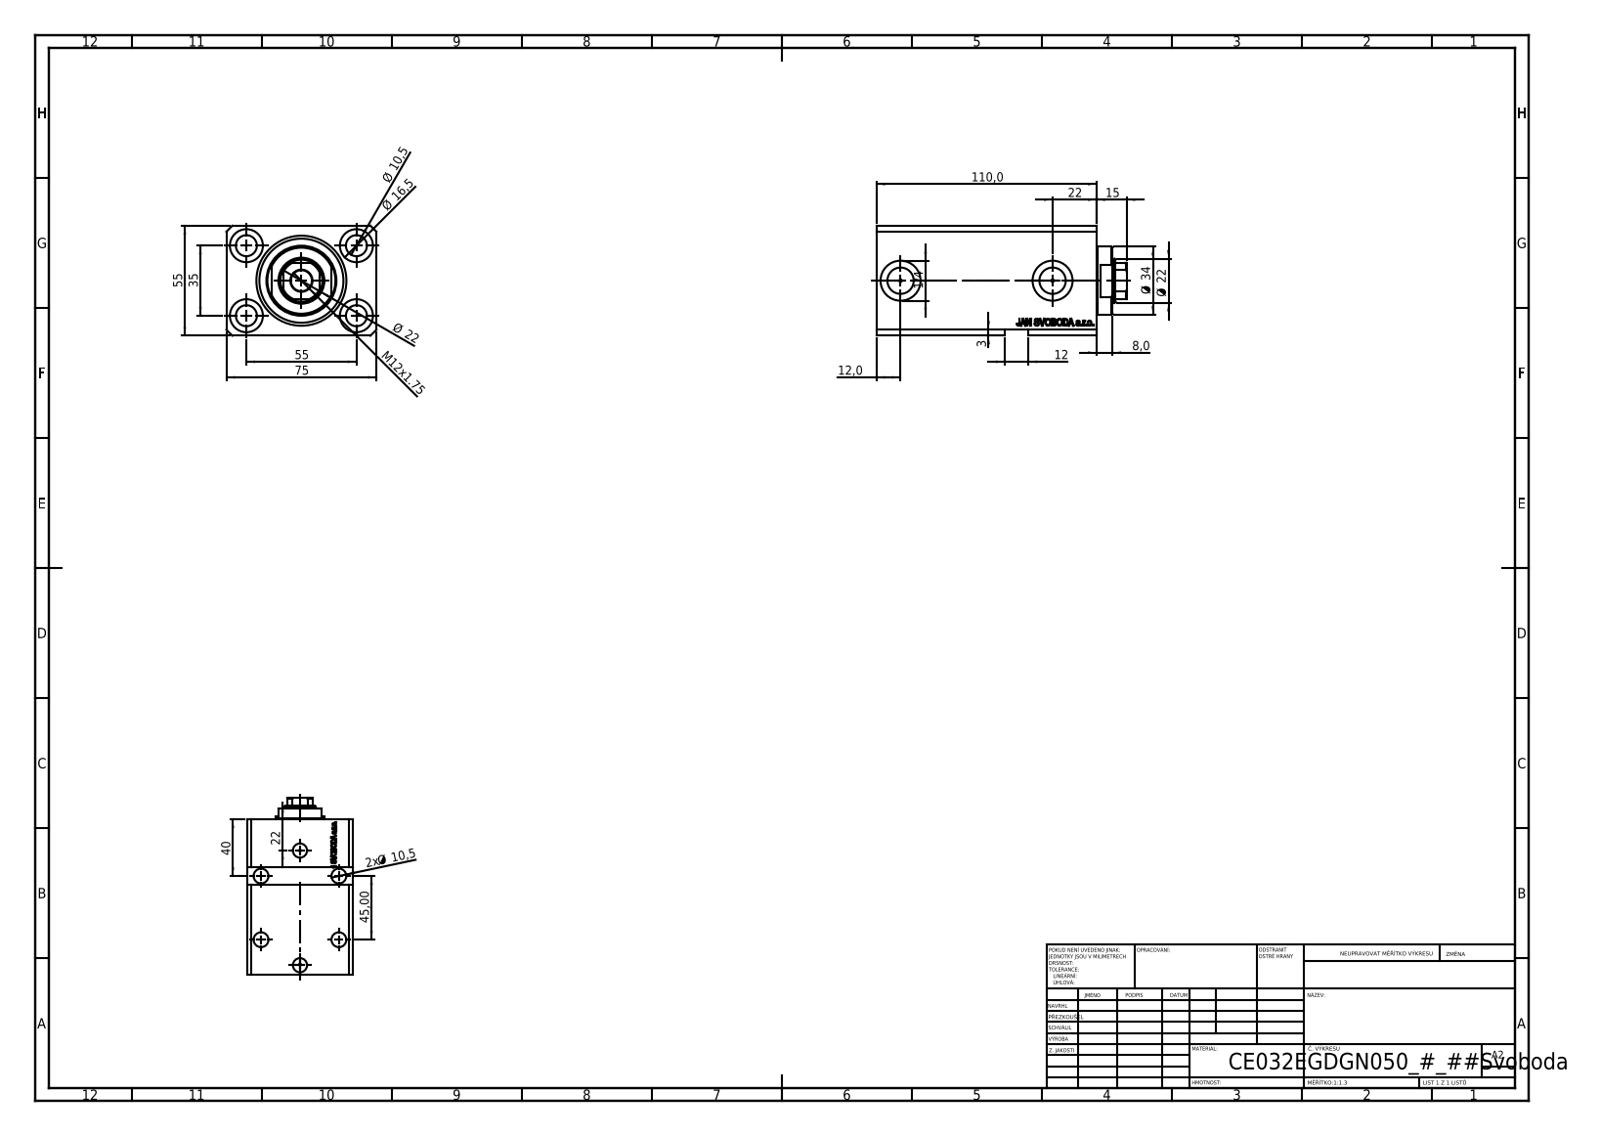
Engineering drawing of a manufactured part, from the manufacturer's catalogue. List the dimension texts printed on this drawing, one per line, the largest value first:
110,0
75
55
55
45,00
40
35
Ø 34
Ø 22
22
Ø 22
22
Ø 16,5
15
M12x1.75
12,0
12
Ø 10,5
2x Ø 10,5
8,0
3
1/4
